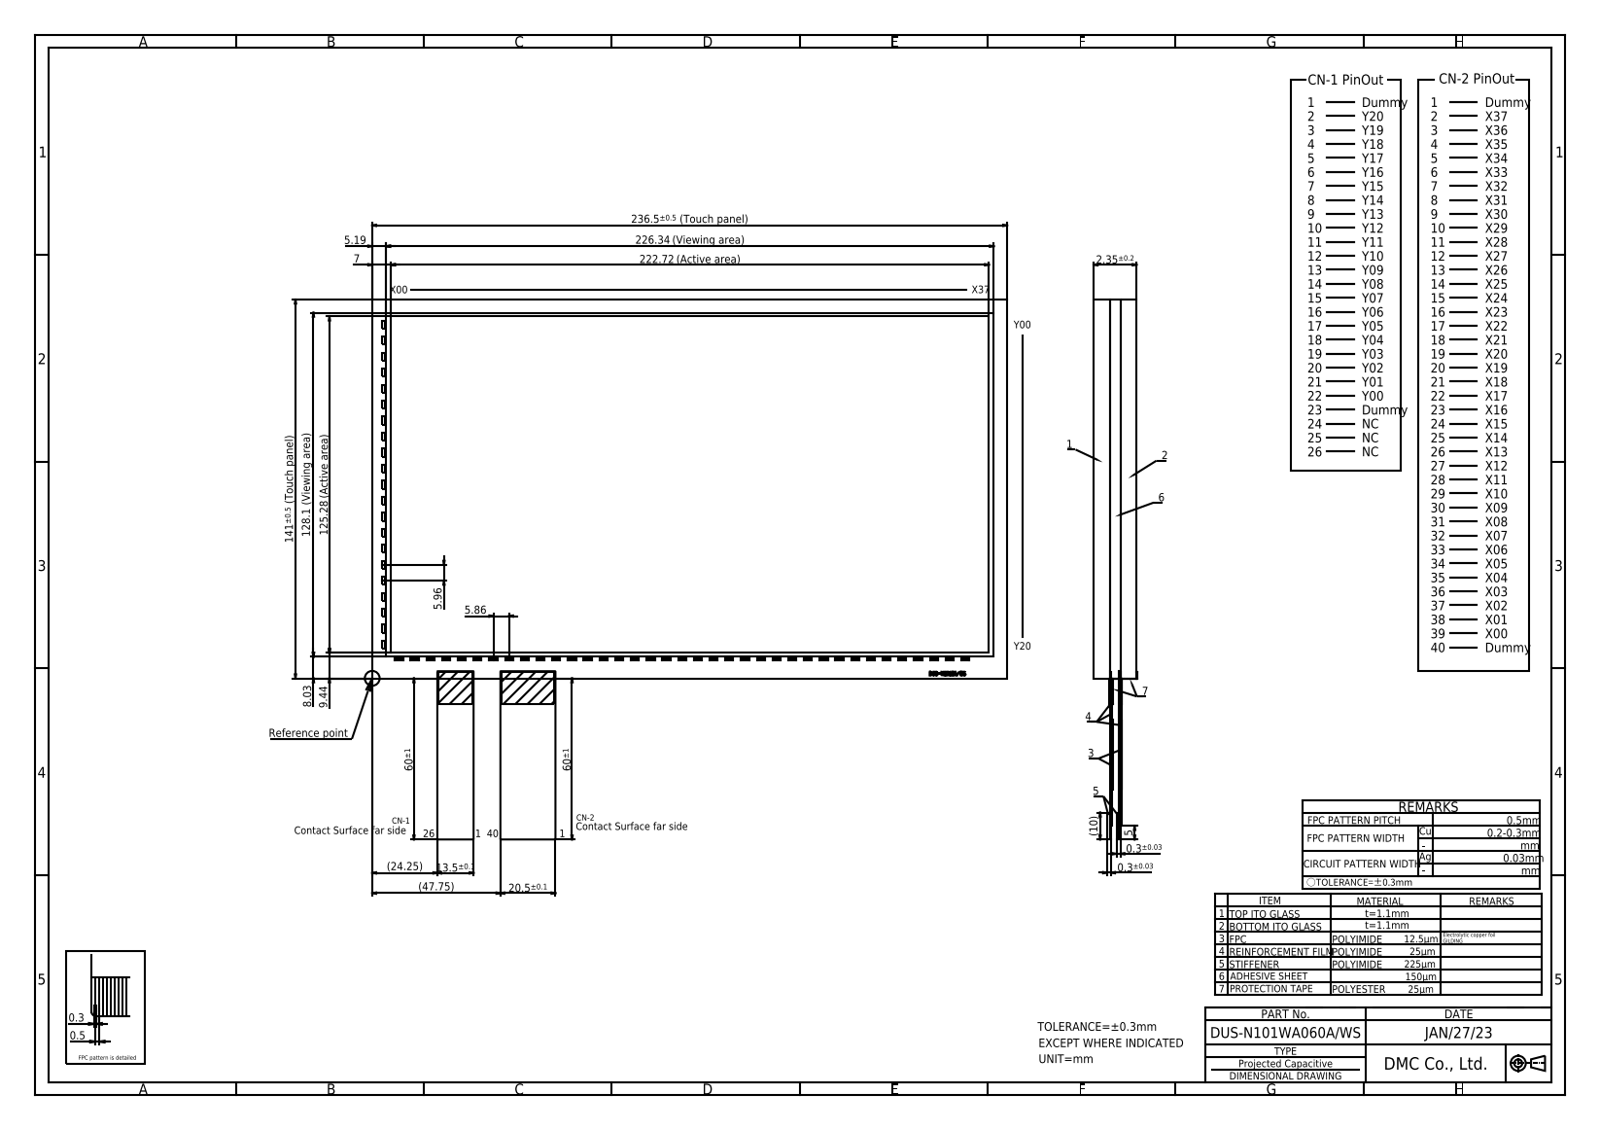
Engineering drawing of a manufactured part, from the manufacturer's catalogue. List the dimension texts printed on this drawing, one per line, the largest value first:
236.5±0.5 (Touch panel)
226.34 (Viewing area)
222.72 (Active area)
141±0.5 (Touch panel)
128.1 (Viewing area)
125.28 (Active area)
60±1
60±1
(47.75)
(24.25)
20.5±0.1
13.5±0.1
(10)
9.44
8.03
7
5.96
5.86
5.19
5
2.35±0.2
0.5
0.3±0.03
0.3±0.03
0.3
